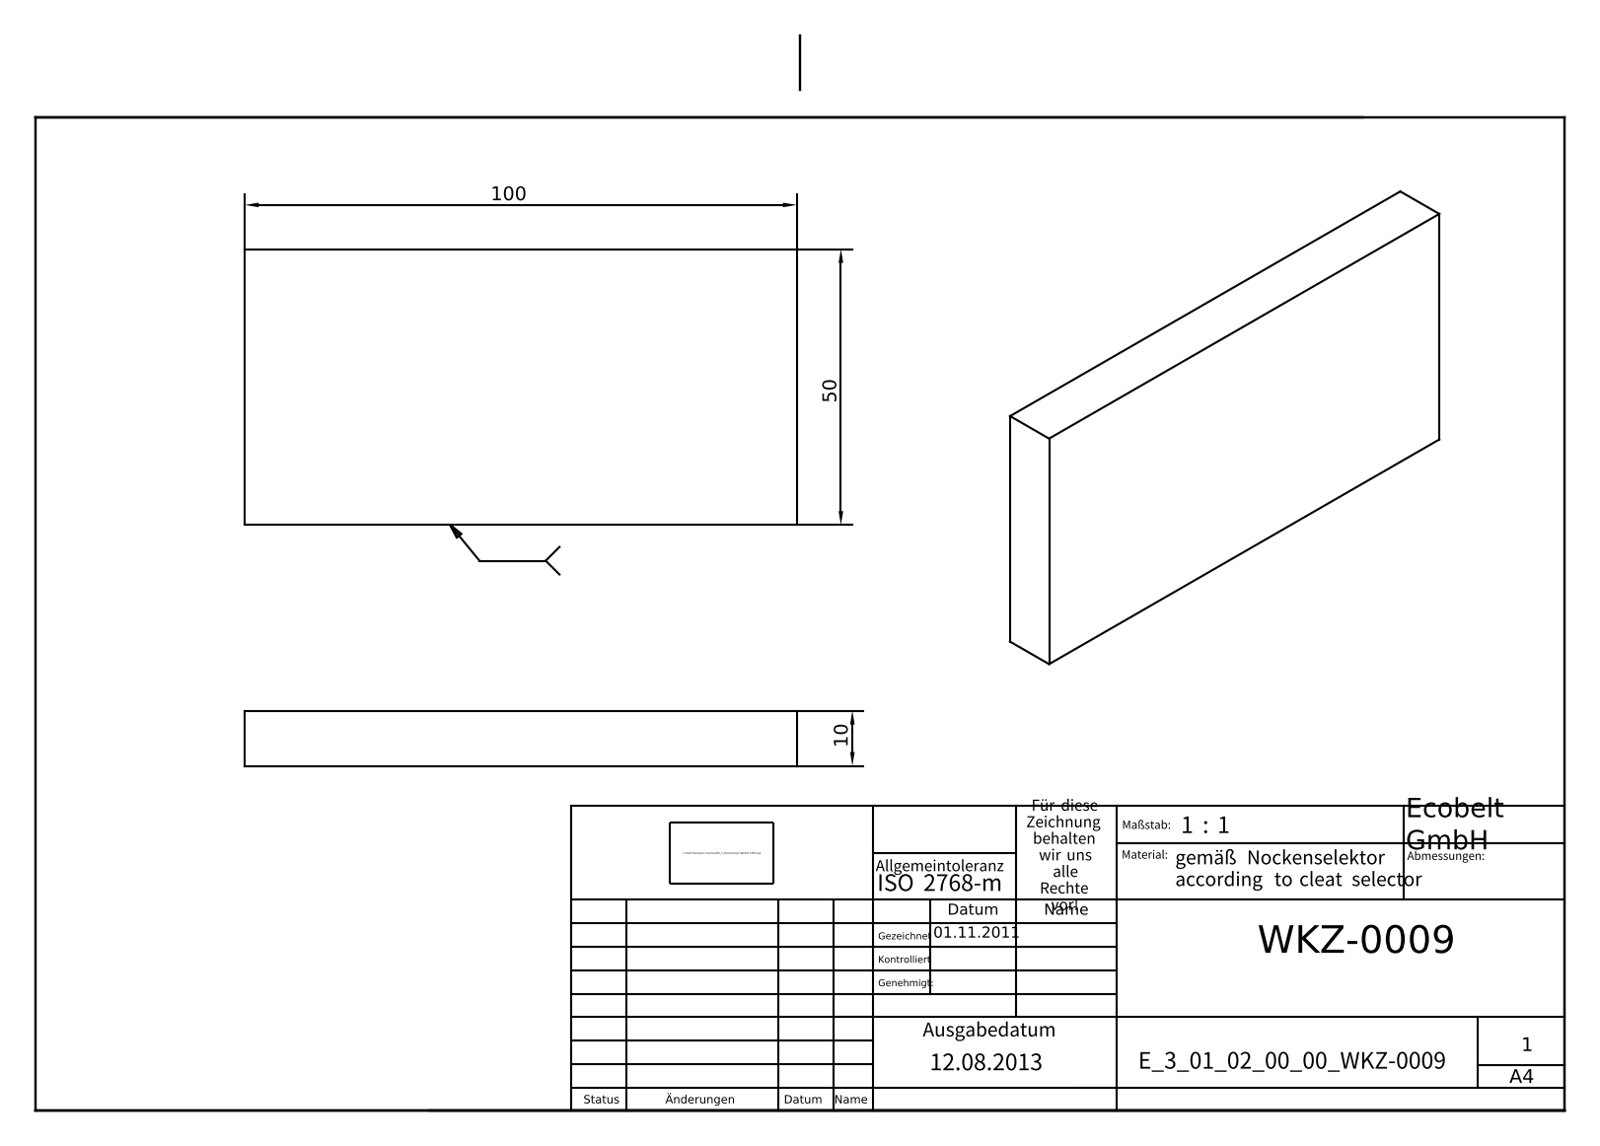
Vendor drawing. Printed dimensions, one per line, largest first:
100
50
10
